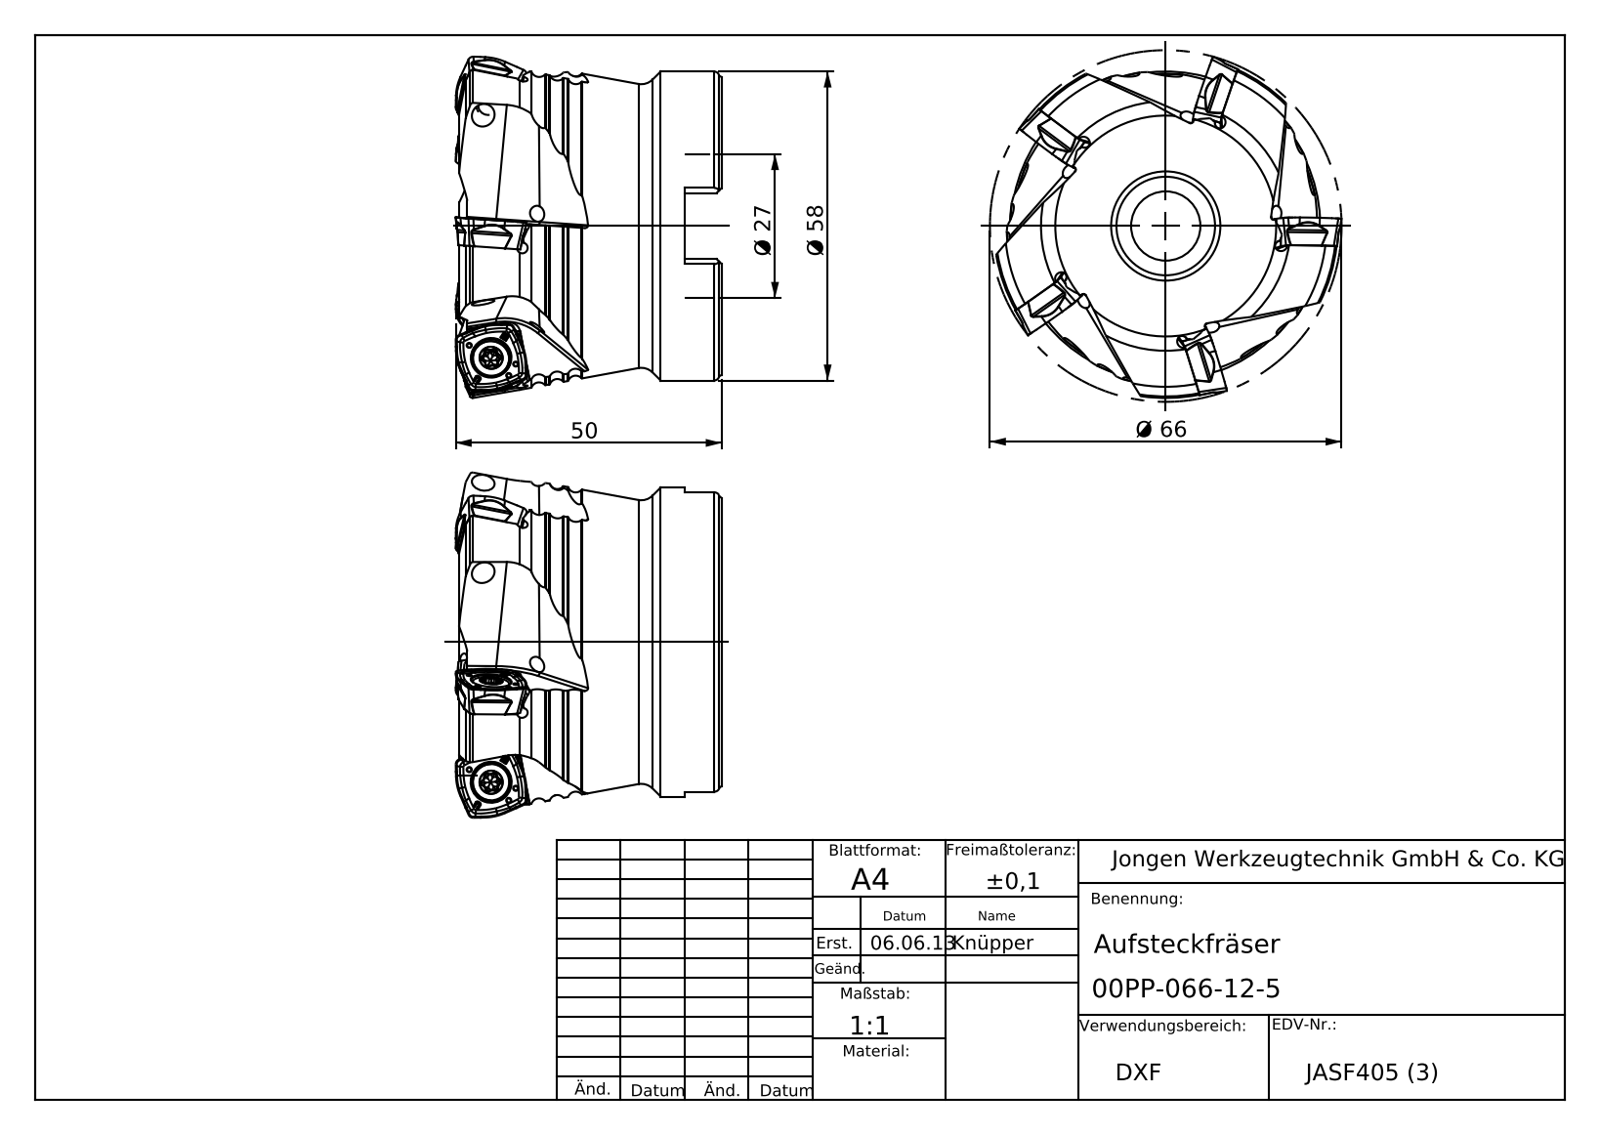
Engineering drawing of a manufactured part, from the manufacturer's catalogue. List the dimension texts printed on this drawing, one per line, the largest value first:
Ø 66
Ø 58
50
Ø 27
